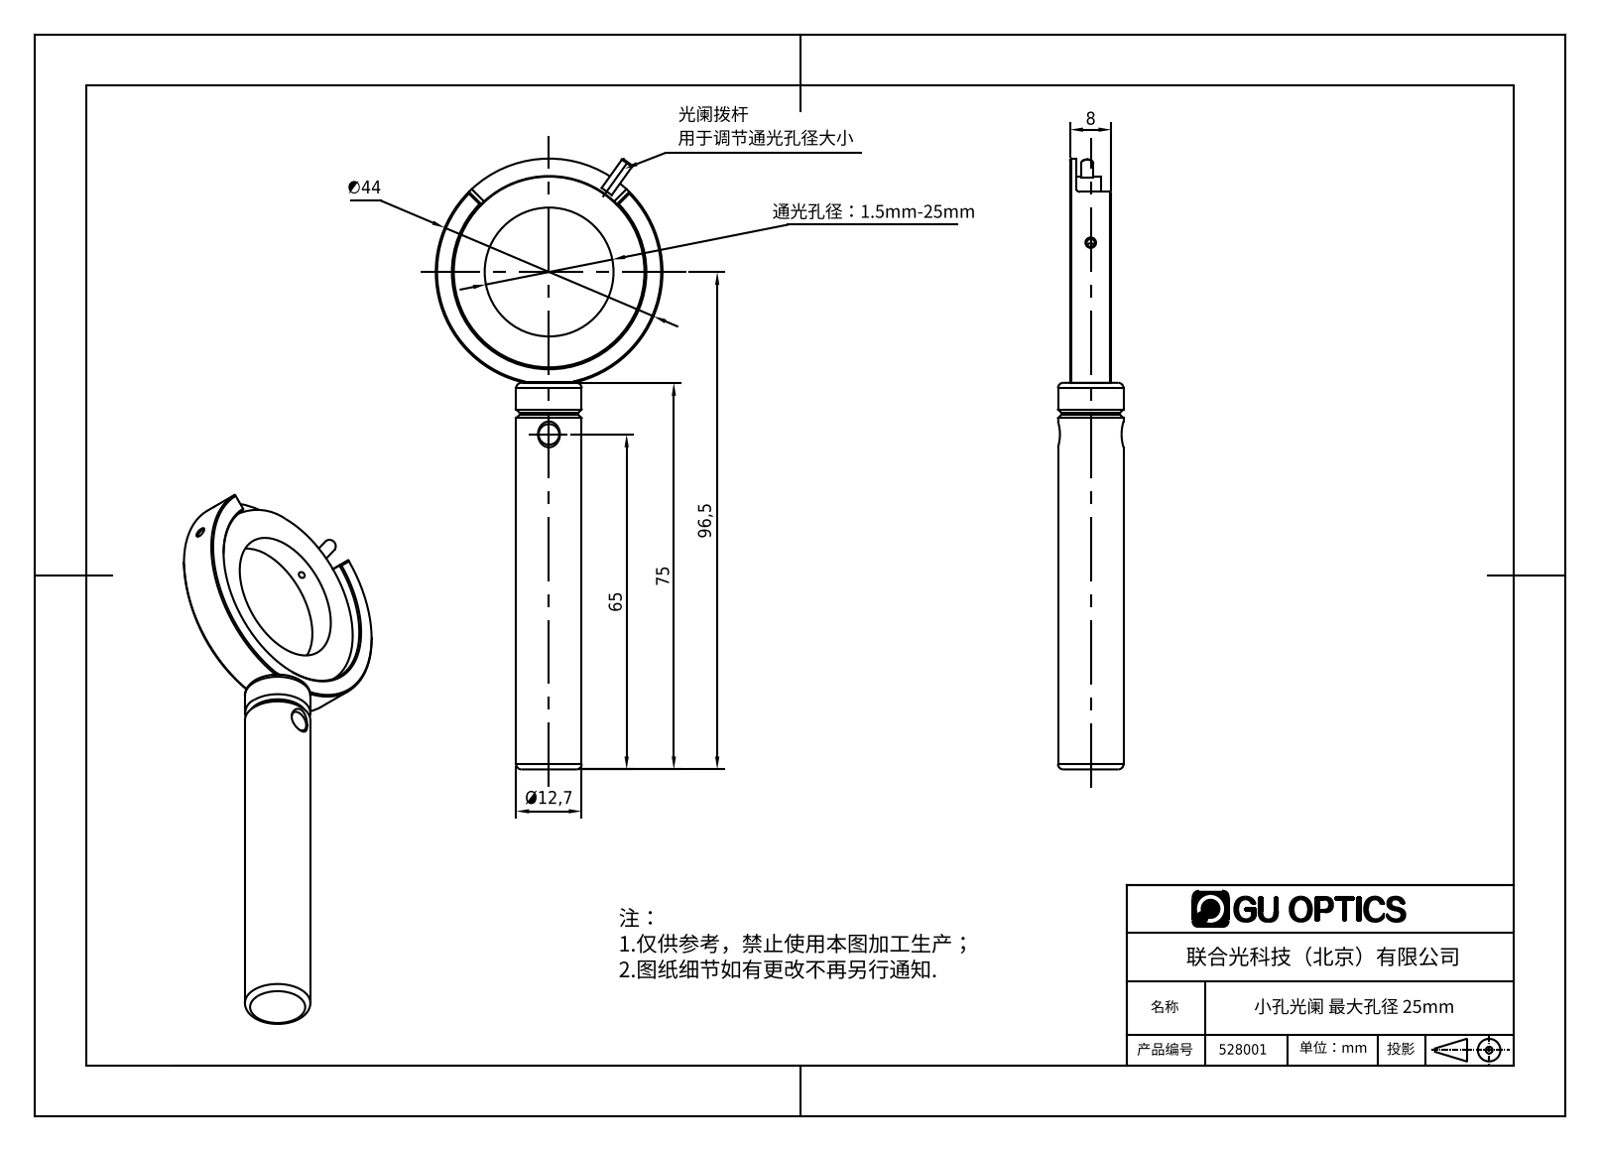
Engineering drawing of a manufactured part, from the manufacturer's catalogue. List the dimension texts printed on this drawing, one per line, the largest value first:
96,5
75
65
∅44
Ø12,7
8
通光孔径：1.5mm-25mm
